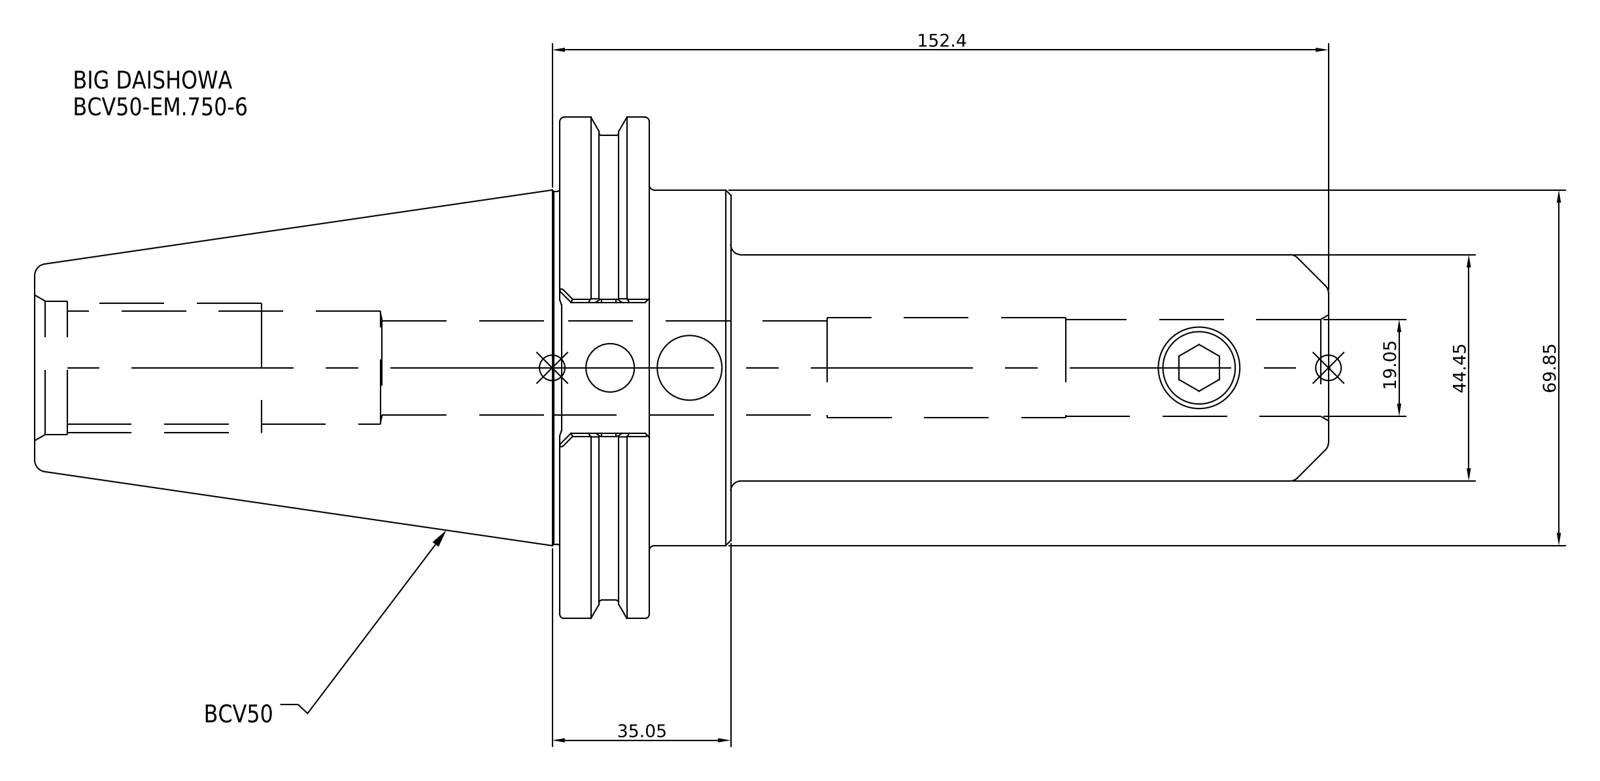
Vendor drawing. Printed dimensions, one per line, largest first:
152.4
69.85
44.45
35.05
19.05
